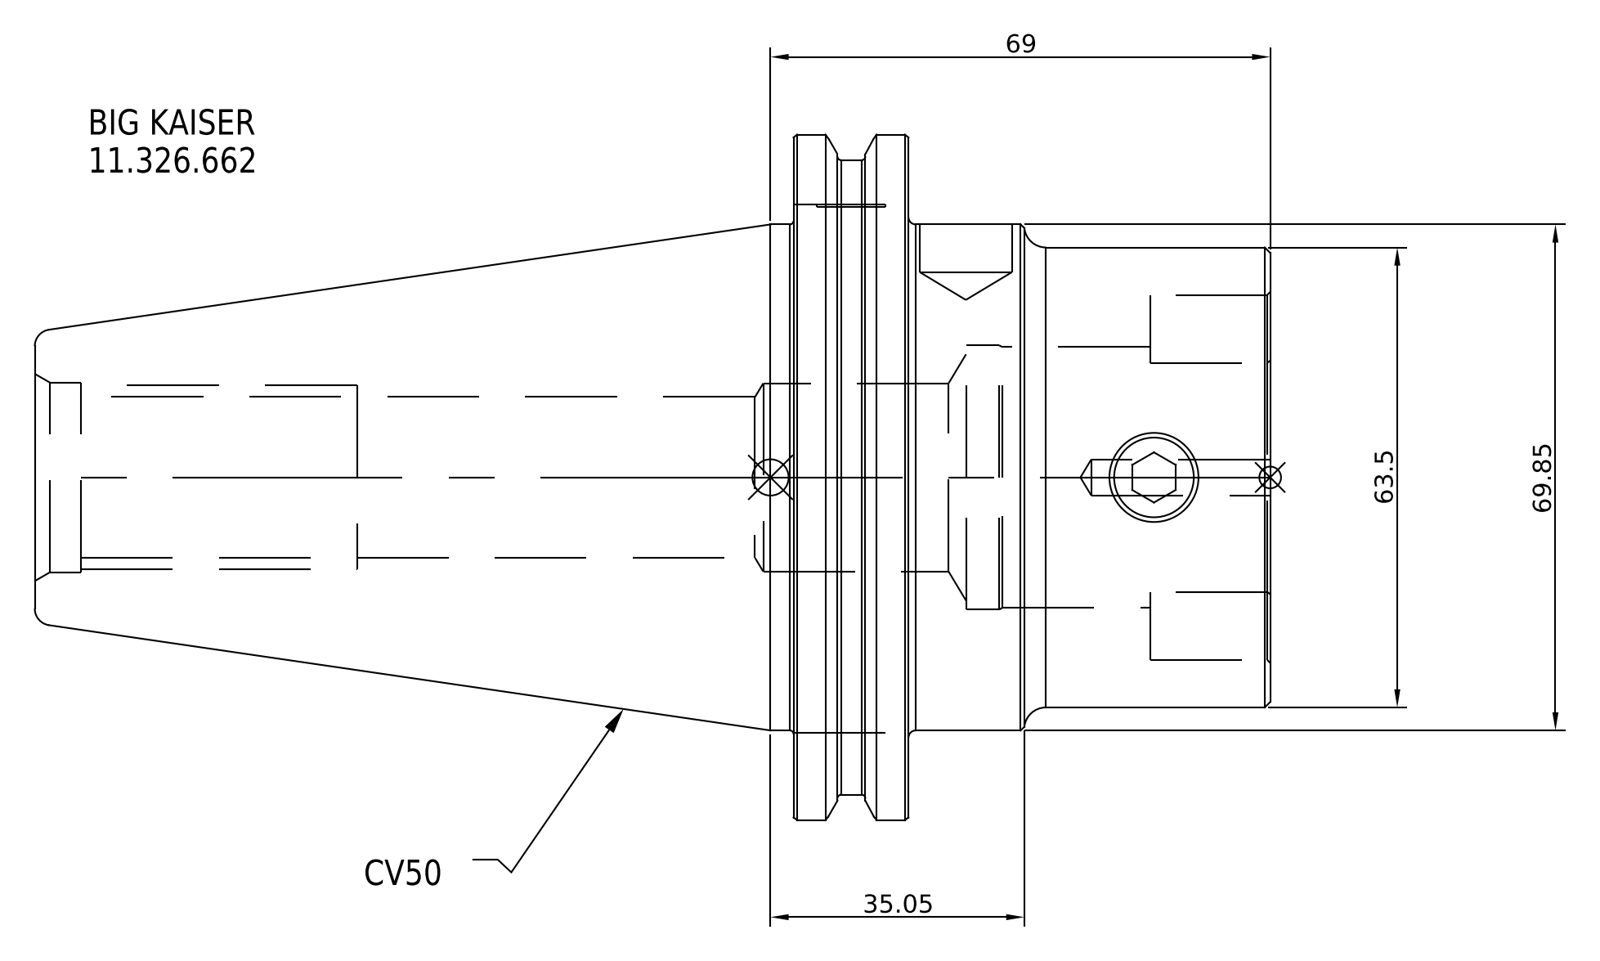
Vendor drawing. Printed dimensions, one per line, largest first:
69.85
69
63.5
35.05
